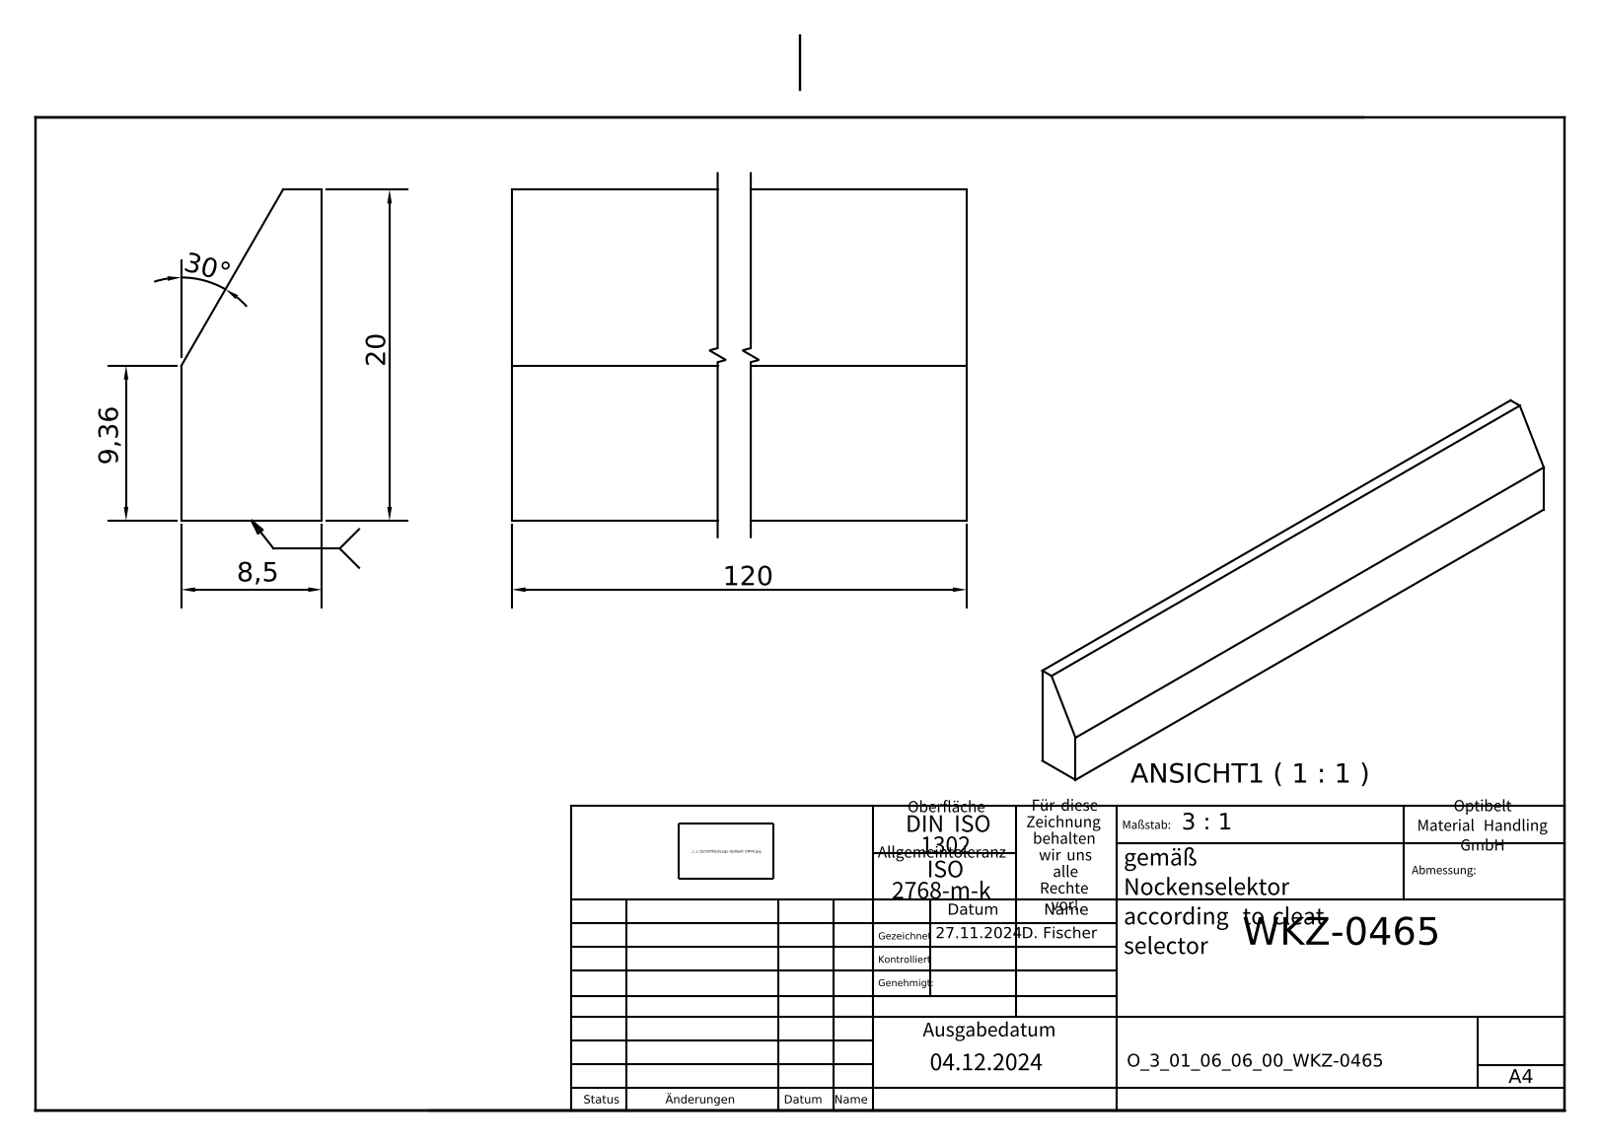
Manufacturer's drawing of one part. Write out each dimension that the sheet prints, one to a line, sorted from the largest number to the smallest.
120
30°
20
9,36
8,5
